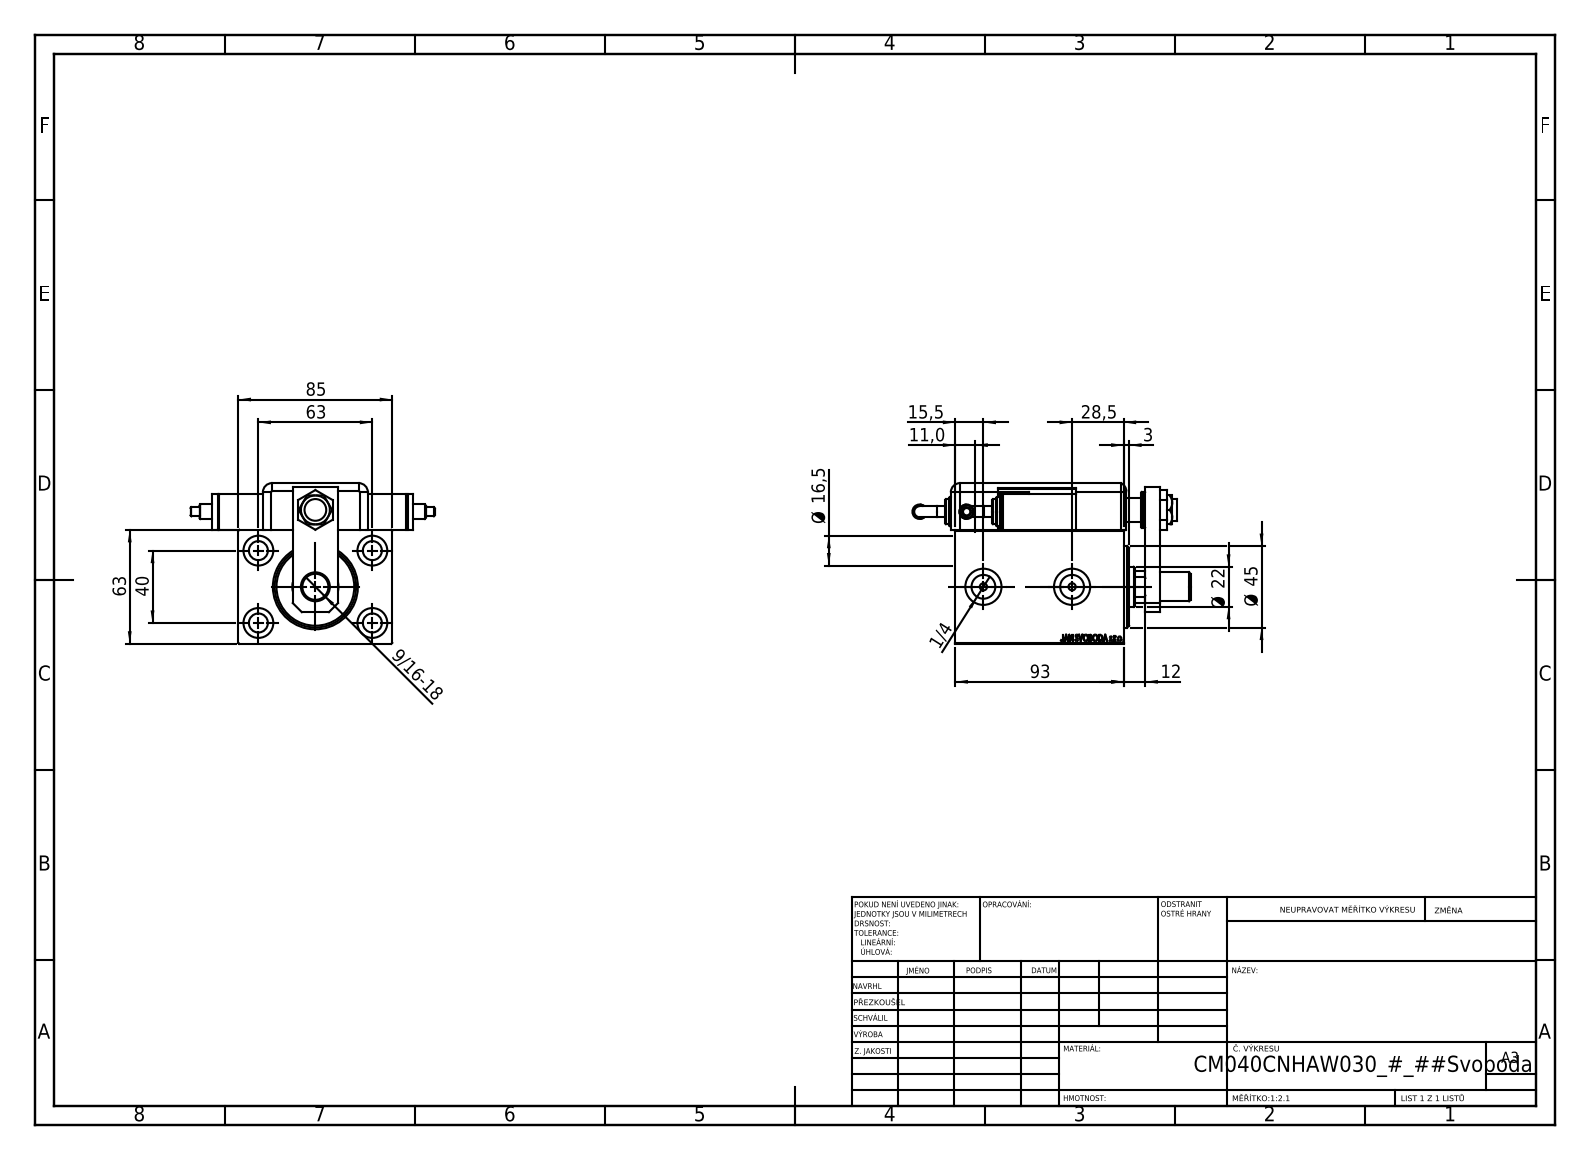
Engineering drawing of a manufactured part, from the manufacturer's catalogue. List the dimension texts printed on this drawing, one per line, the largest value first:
93
85
63
63
Ø 45
40
28,5
Ø 22
Ø 16,5
15,5
12
11,0
3
9/16-18
1/4
